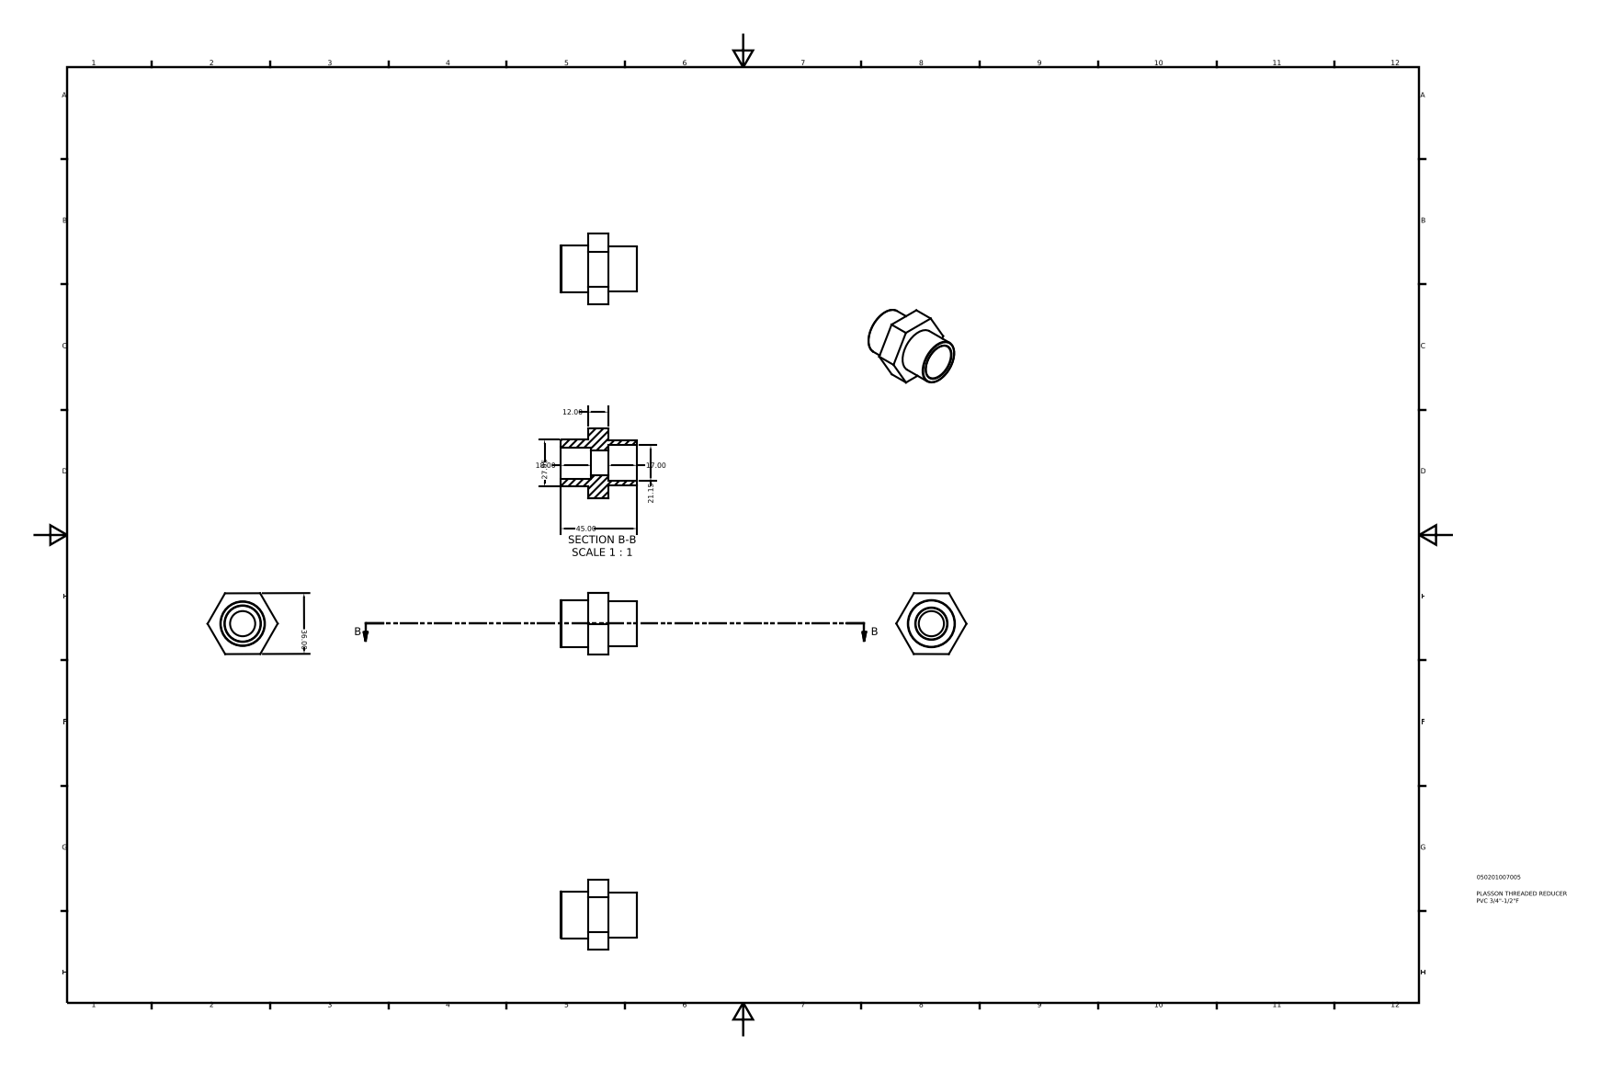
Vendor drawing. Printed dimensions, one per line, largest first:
45.00
36.00
27.95
21.15
18.00
17.00
12.00
